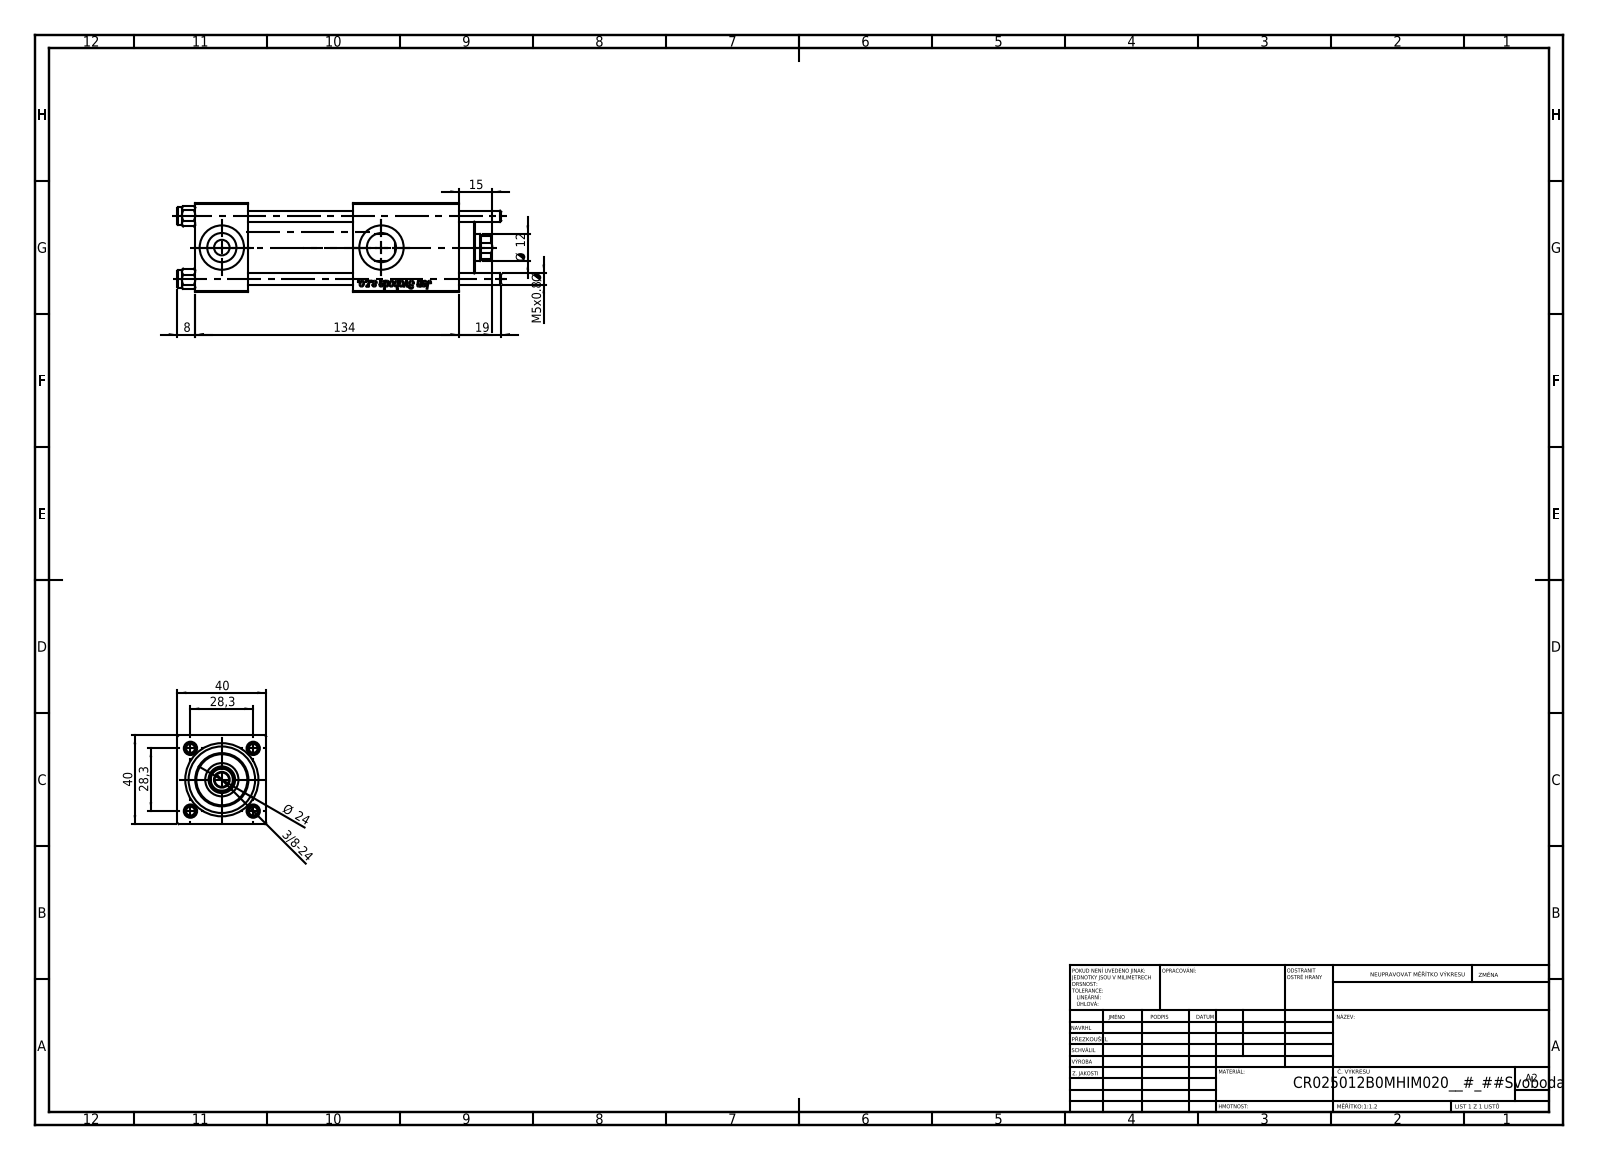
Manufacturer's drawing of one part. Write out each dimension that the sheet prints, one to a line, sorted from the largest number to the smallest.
134
40
40
28,3
28,3
Ø 24
19
15
Ø 12
8
M5x0.8 Ø
3/8-24
